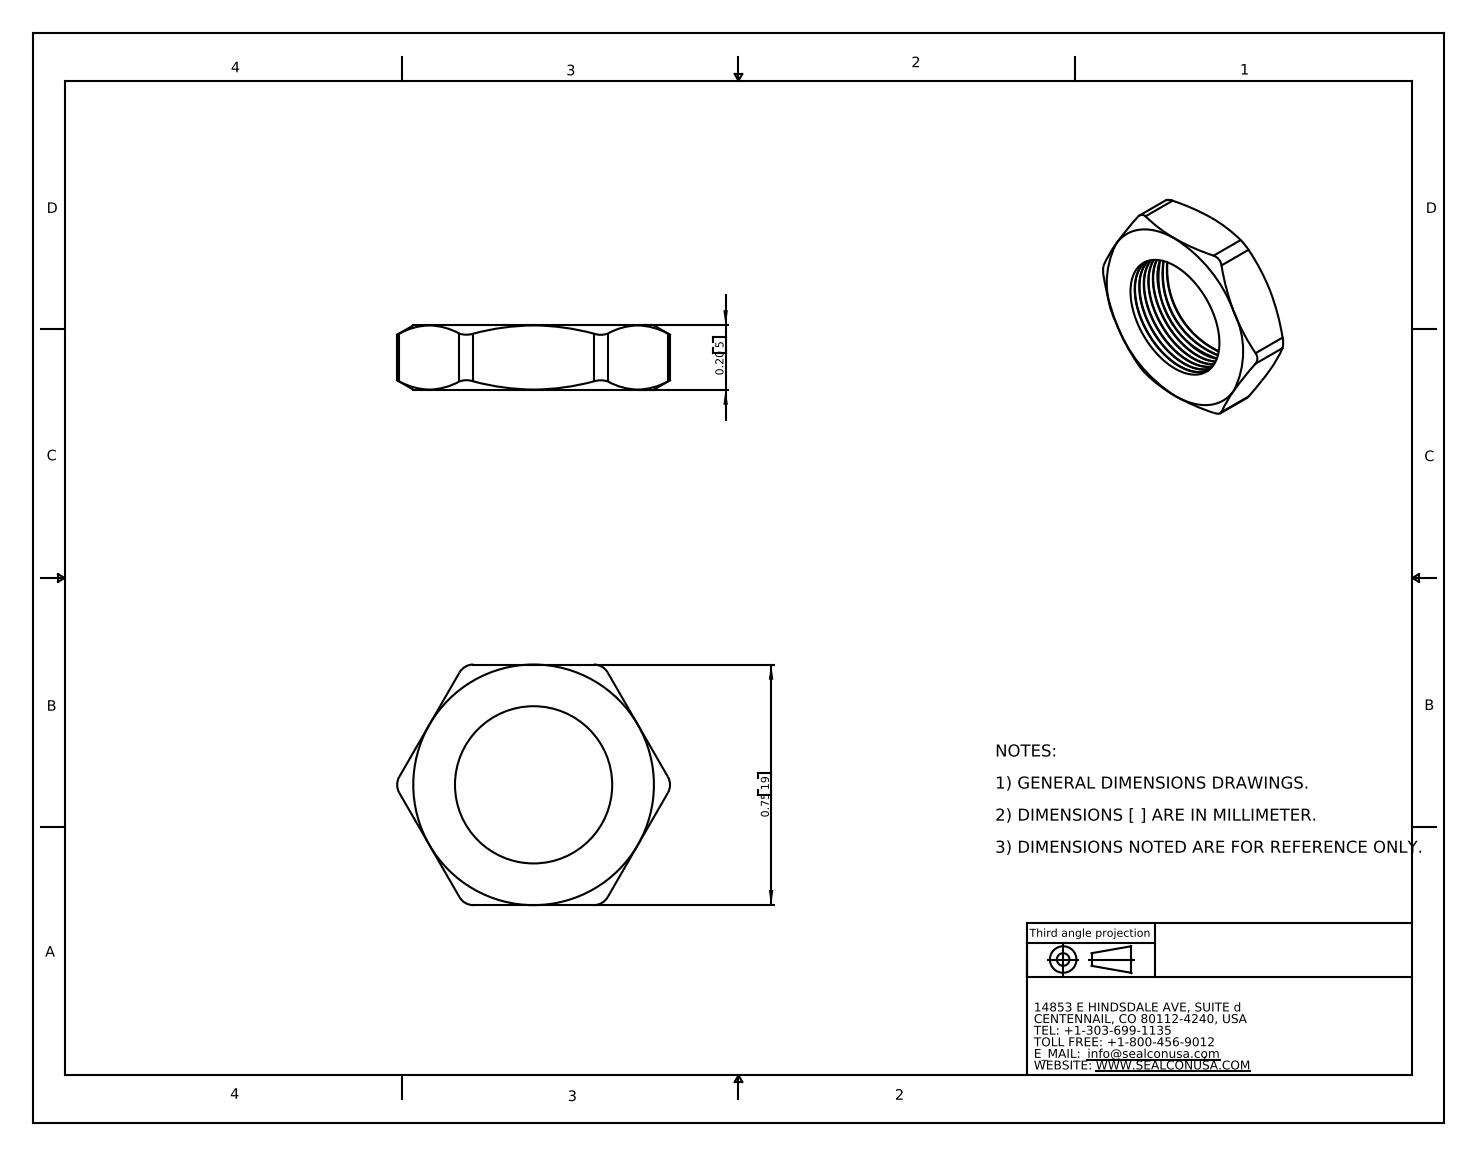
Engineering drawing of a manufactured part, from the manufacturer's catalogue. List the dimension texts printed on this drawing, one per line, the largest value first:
0.75 19
0.20 5
